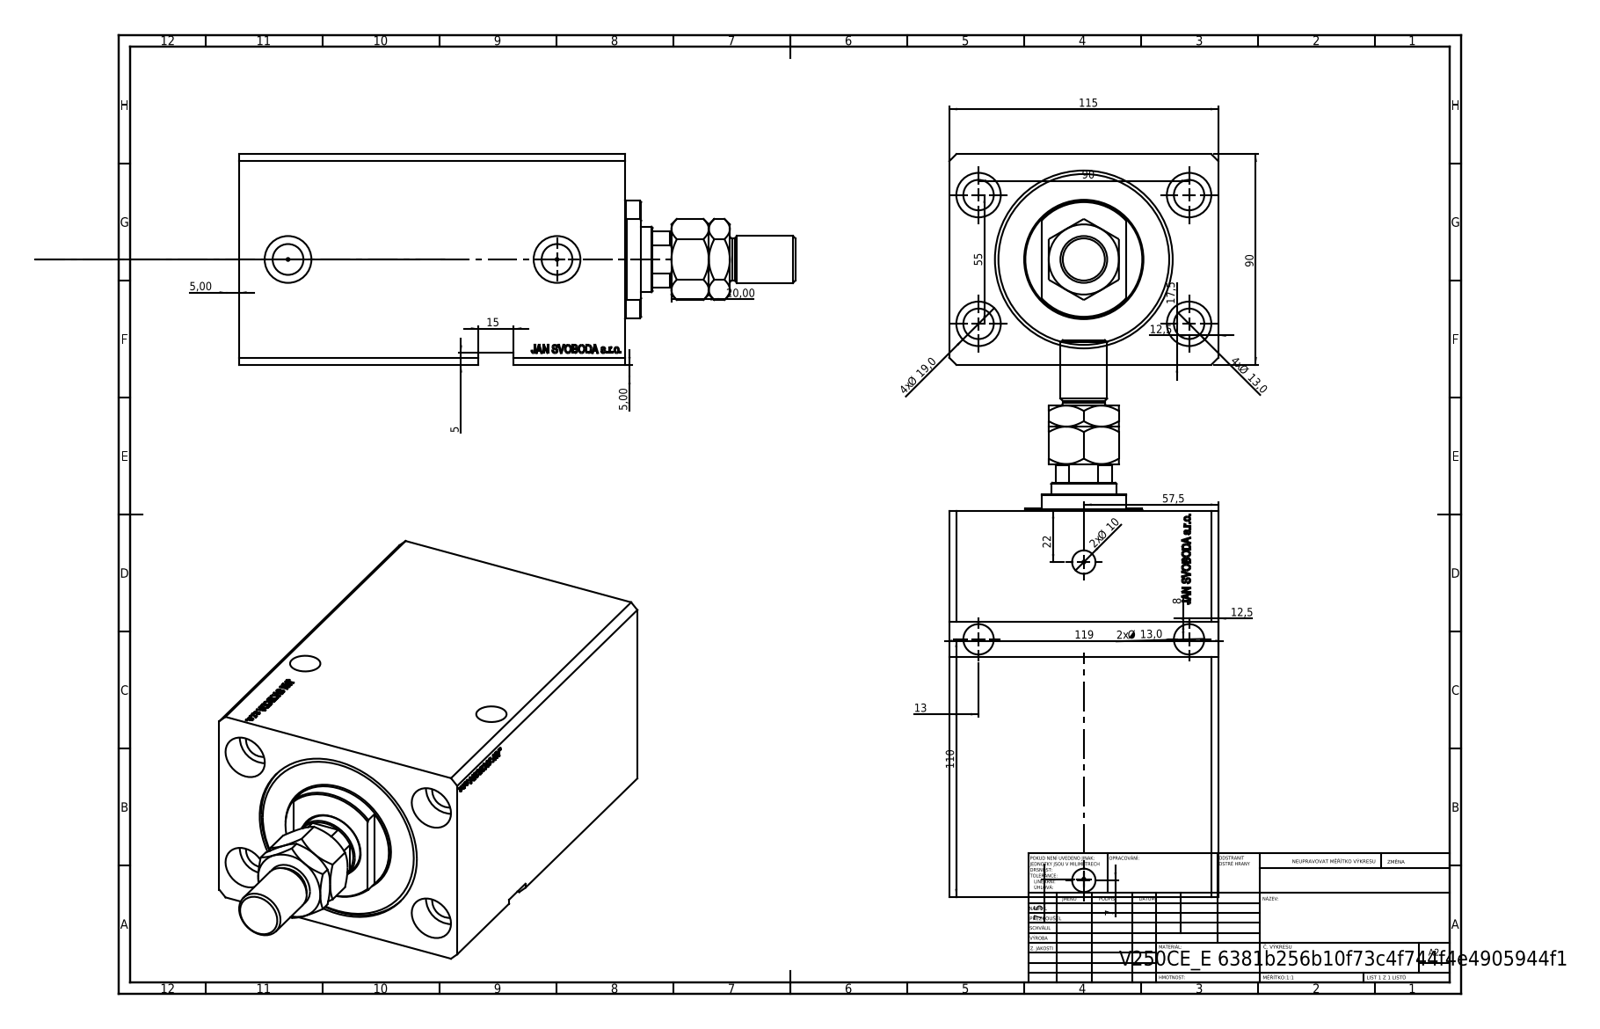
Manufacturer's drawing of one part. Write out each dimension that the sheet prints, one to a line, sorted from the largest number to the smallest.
119
115
110
90
90
57,5
55
22
20,00
4x Ø 19,0
17,5
15
4x Ø 13,0
2x Ø 13,0
13
12,5
12,5
2x Ø 10
8
7,5
7
5,00
5,00
5
